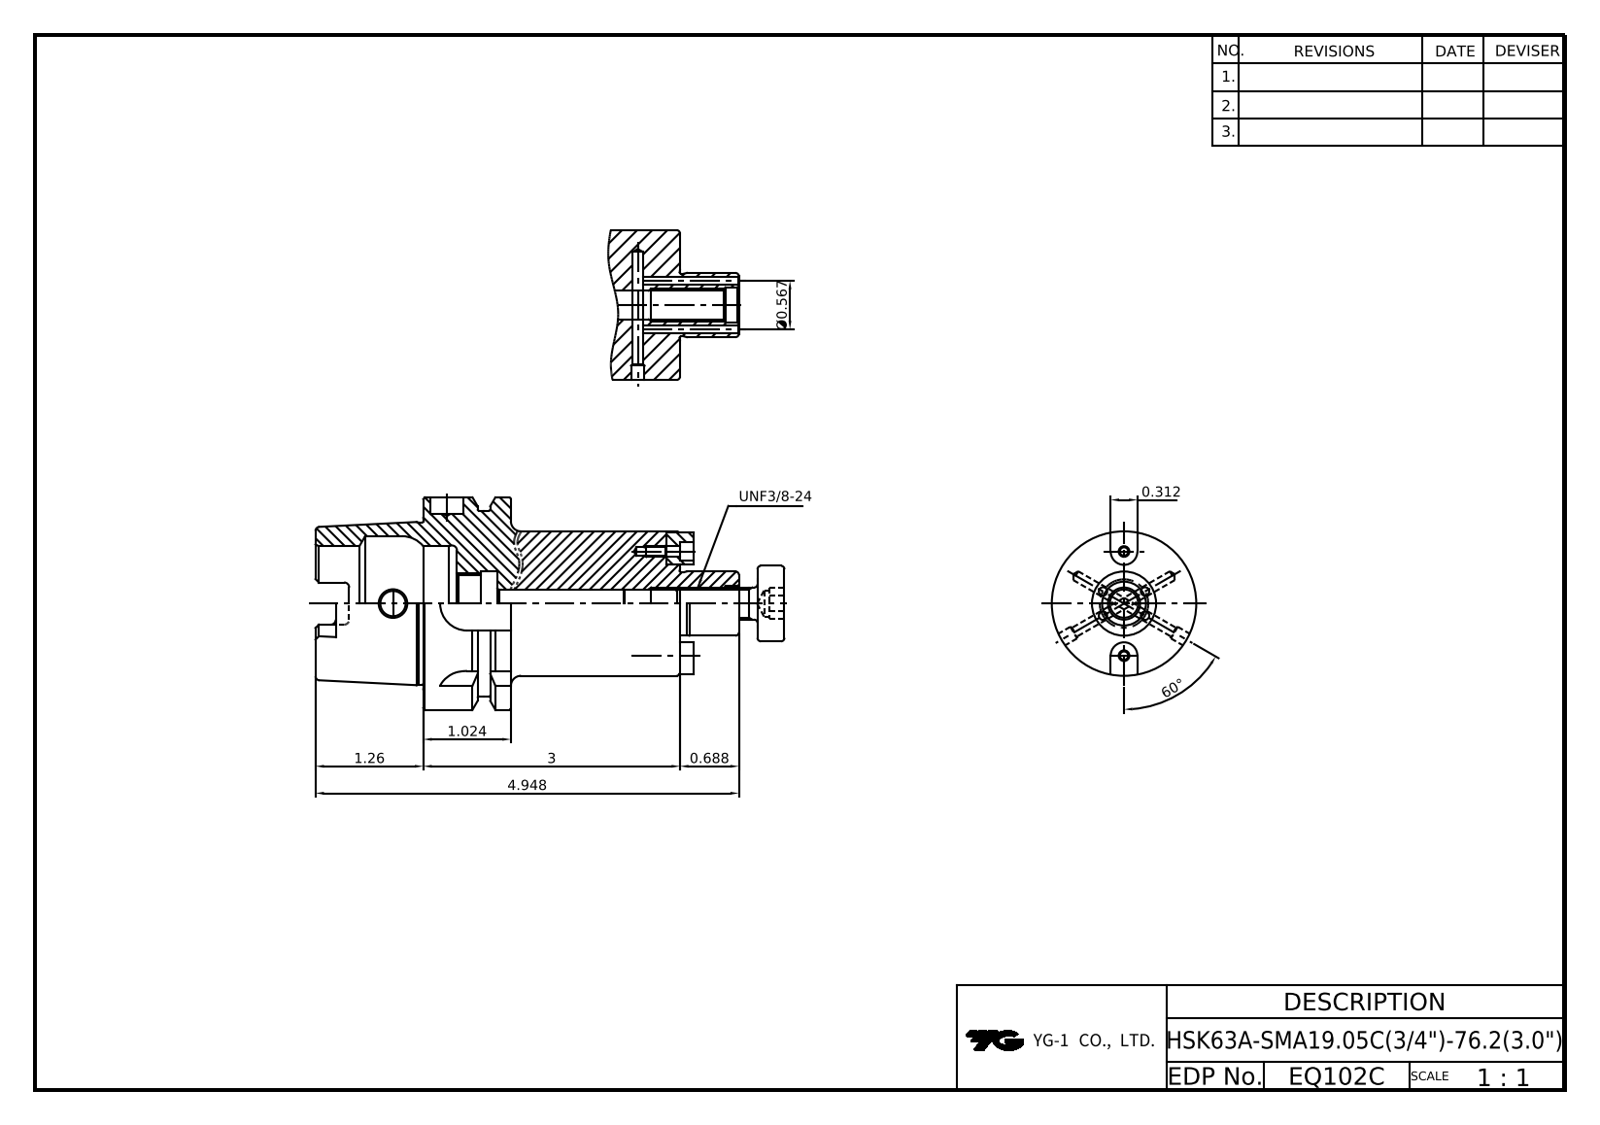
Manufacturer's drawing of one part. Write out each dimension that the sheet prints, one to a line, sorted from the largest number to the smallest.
60°
4.948
3
1.26
1.024
0.688
Ø0.567
0.312
